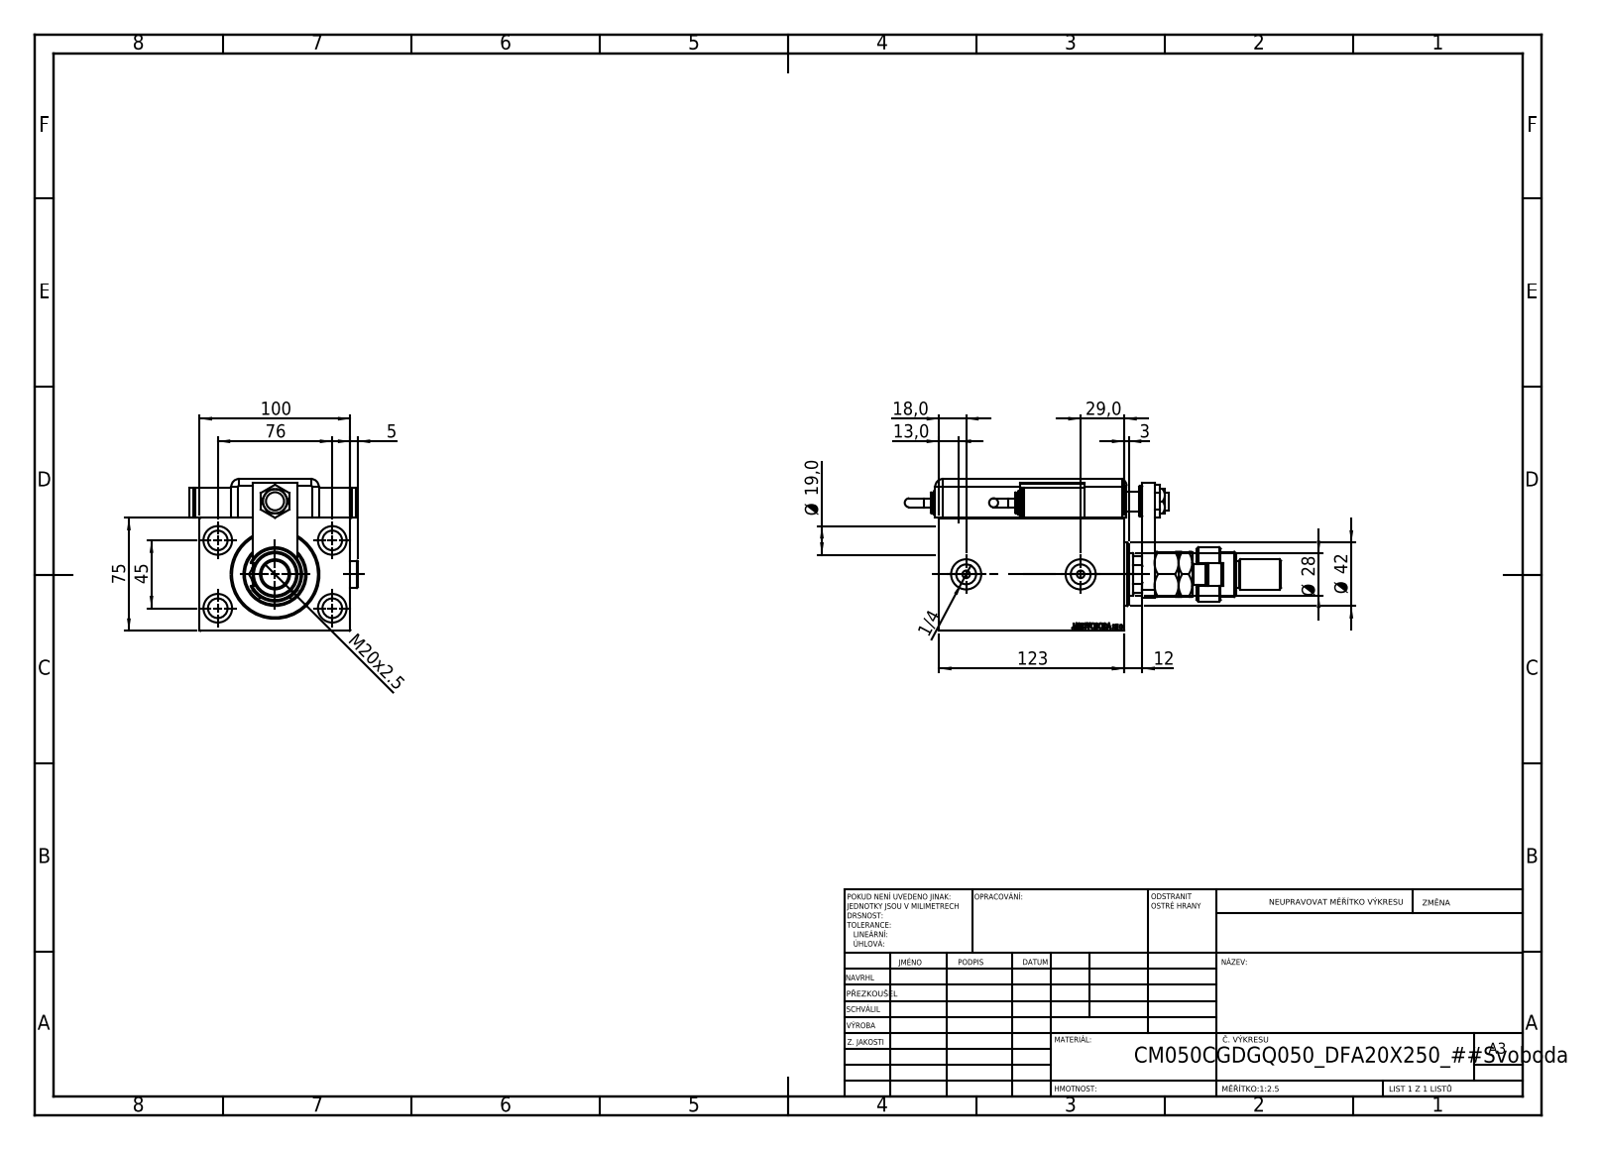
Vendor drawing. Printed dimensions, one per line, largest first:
123
100
76
75
45
Ø 42
29,0
Ø 28
M20x2.5
Ø 19,0
18,0
13,0
12
5
3
1/4
